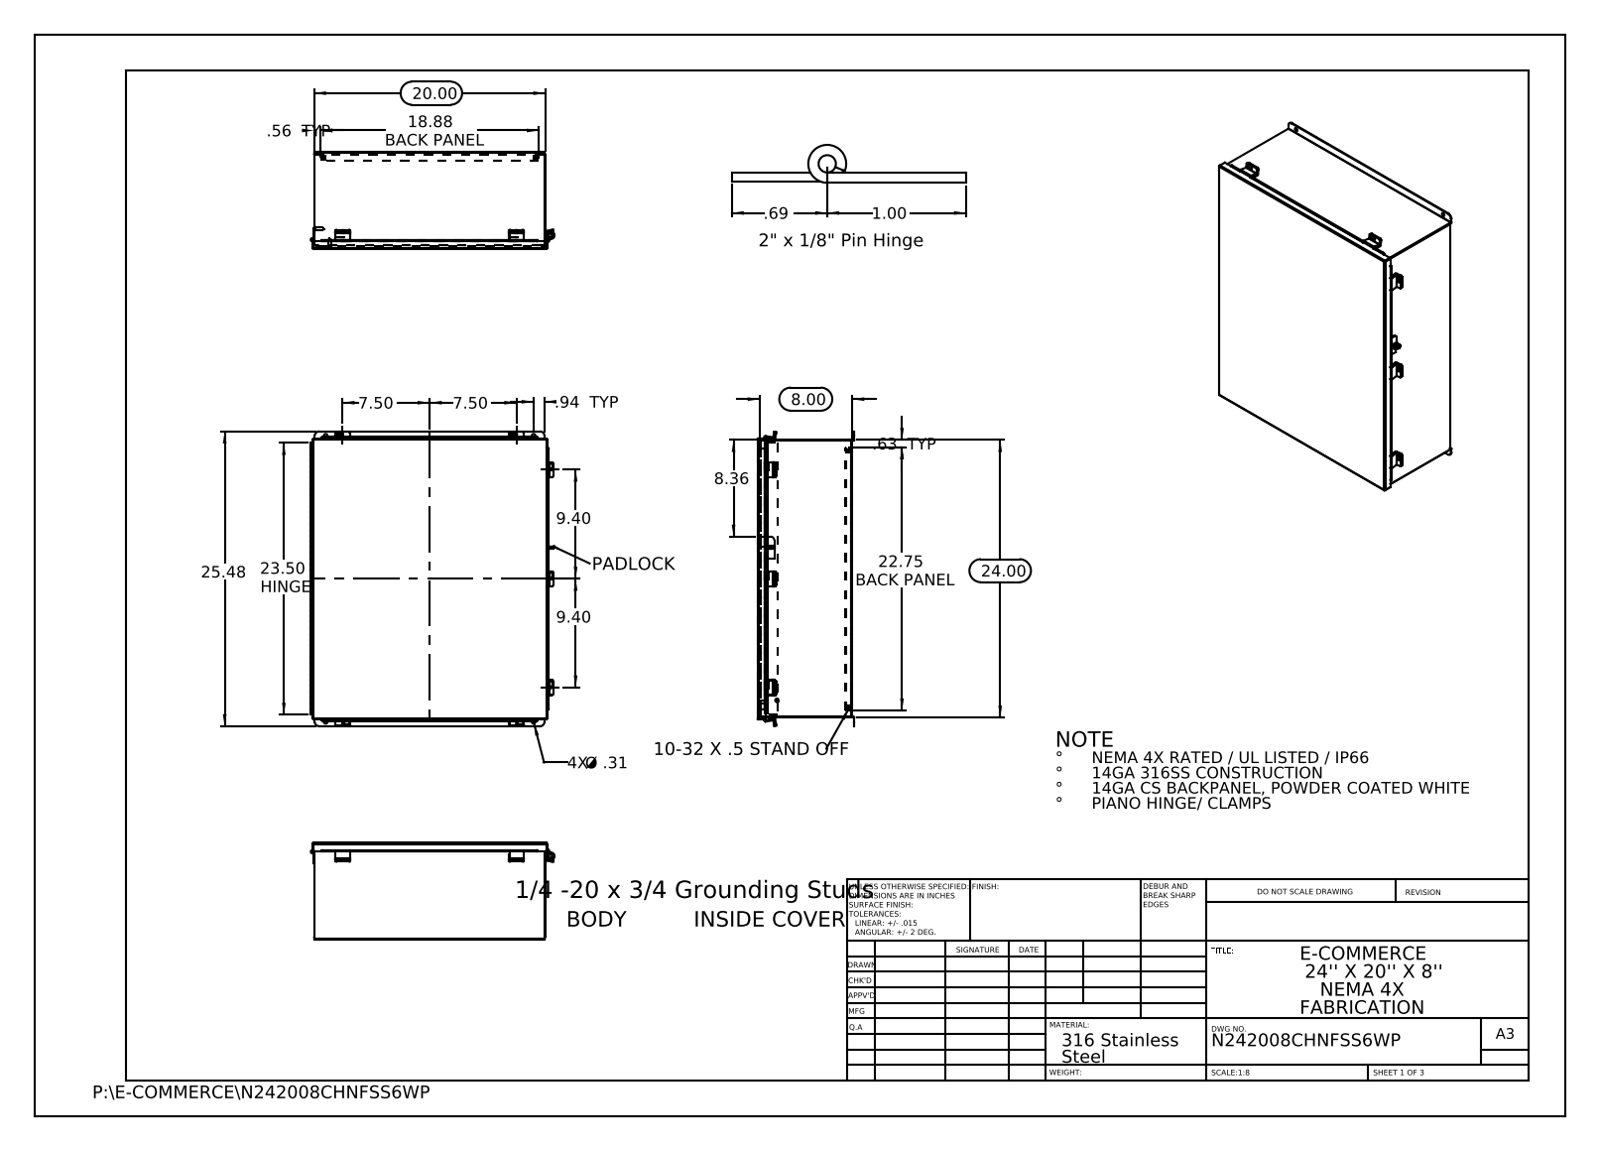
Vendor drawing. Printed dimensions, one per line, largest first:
25.48
24.00
23.50 HINGE
22.75 BACK PANEL
20.00
18.88 BACK PANEL
9.40
9.40
8.36
8.00
7.50
7.50
1.00
.94 TYP
.69
.63 TYP
.56 TYP
4X Ø .31
